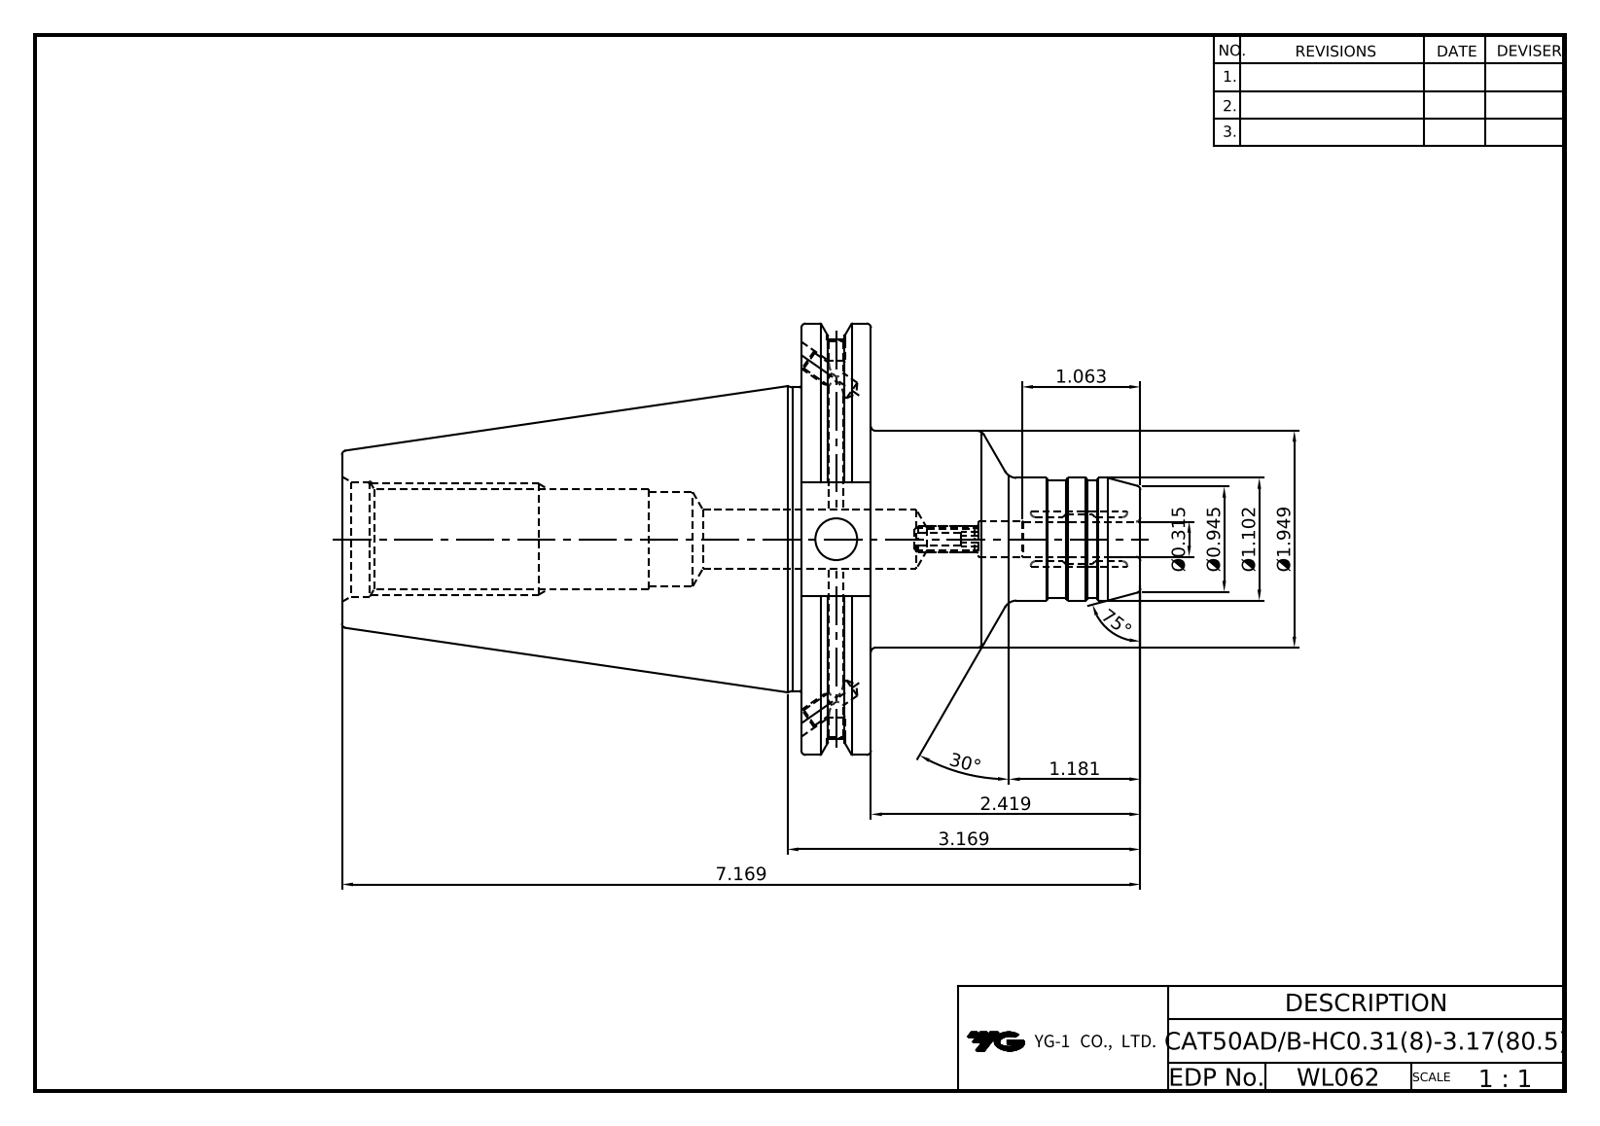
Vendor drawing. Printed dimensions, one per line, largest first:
75°
30°
7.169
3.169
2.419
Ø1.949
1.181
Ø1.102
1.063
Ø0.945
Ø0.315
